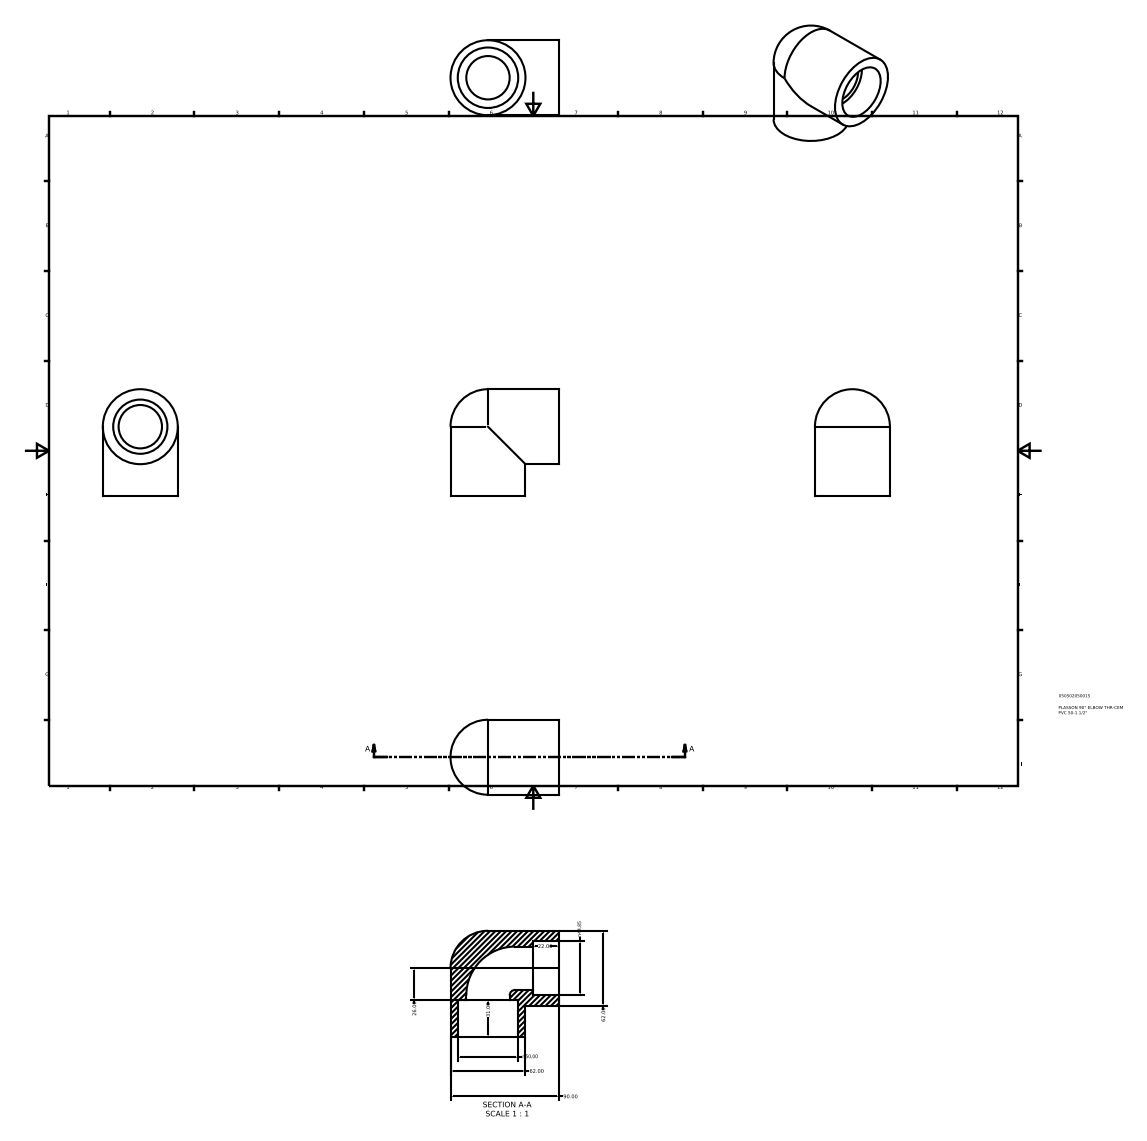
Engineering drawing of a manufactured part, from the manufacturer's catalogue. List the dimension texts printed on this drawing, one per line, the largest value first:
90.00
62.00
62.00
n50.00
n44.85
31.00
26.00
22.00
